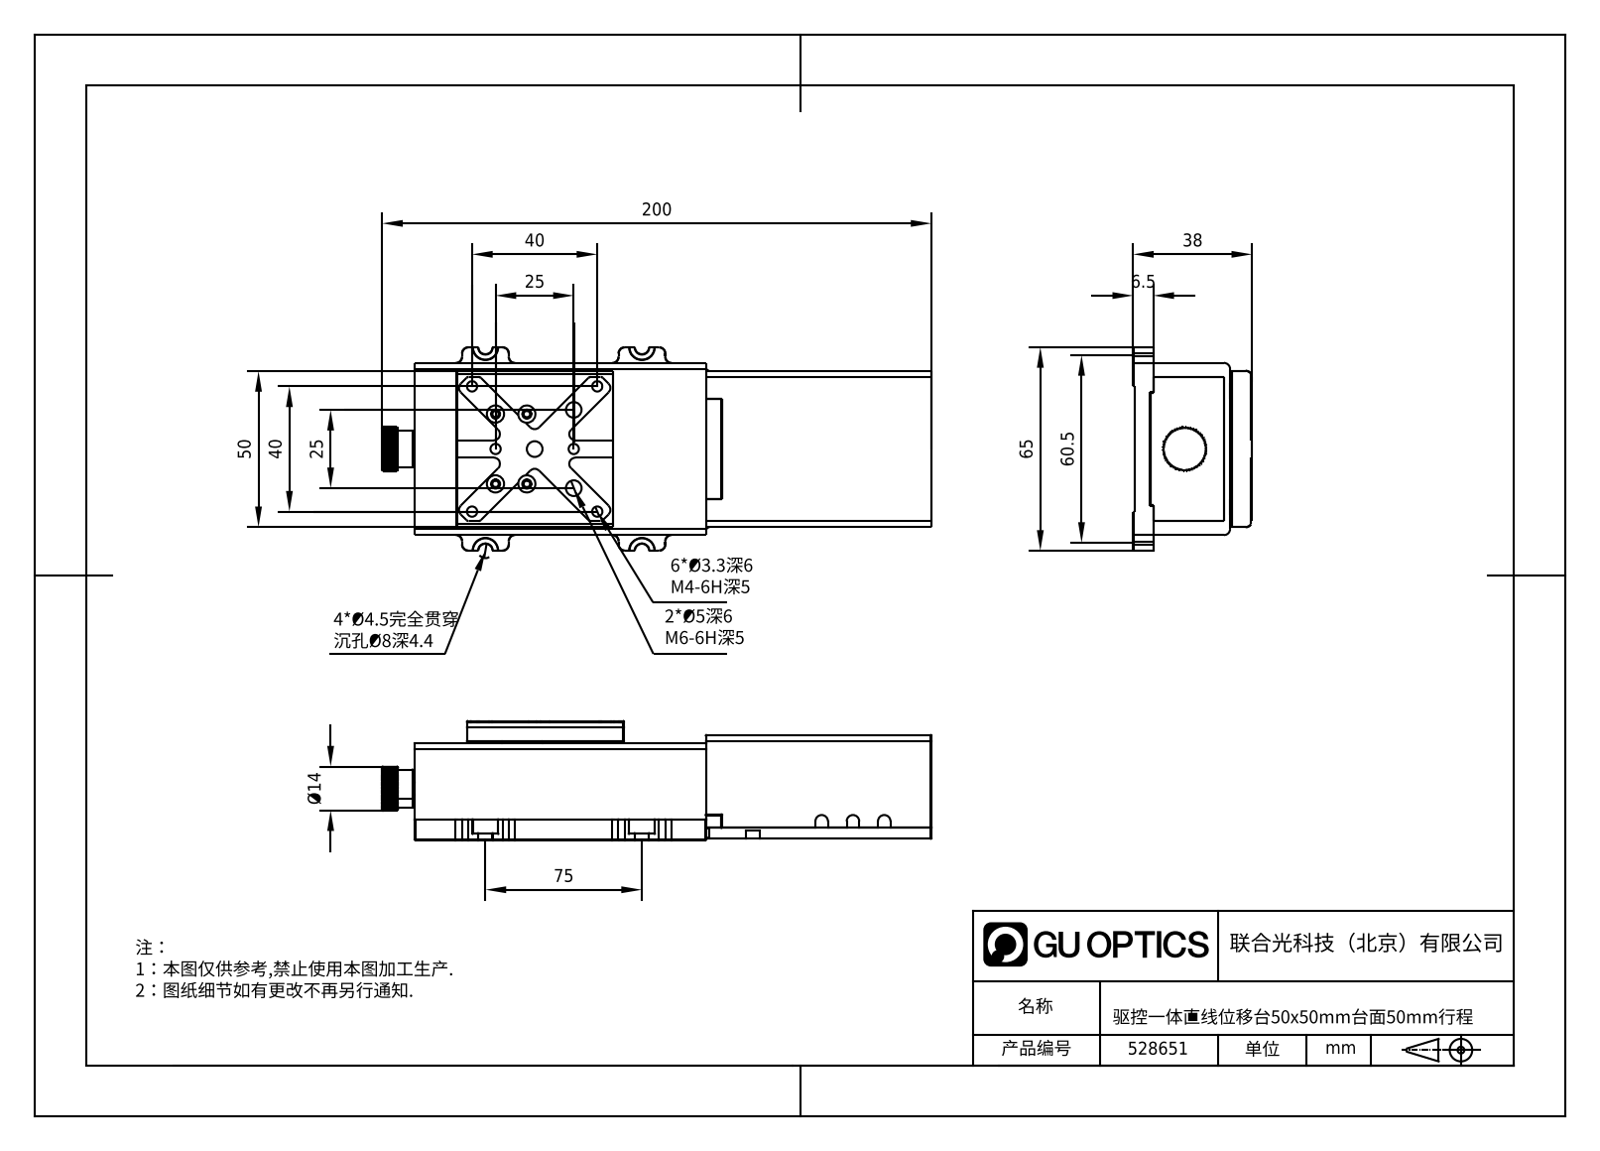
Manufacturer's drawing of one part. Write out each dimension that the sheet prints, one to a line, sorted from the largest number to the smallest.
200
75
65
60.5
50
40
40
38
25
25
Ø14
6.5
